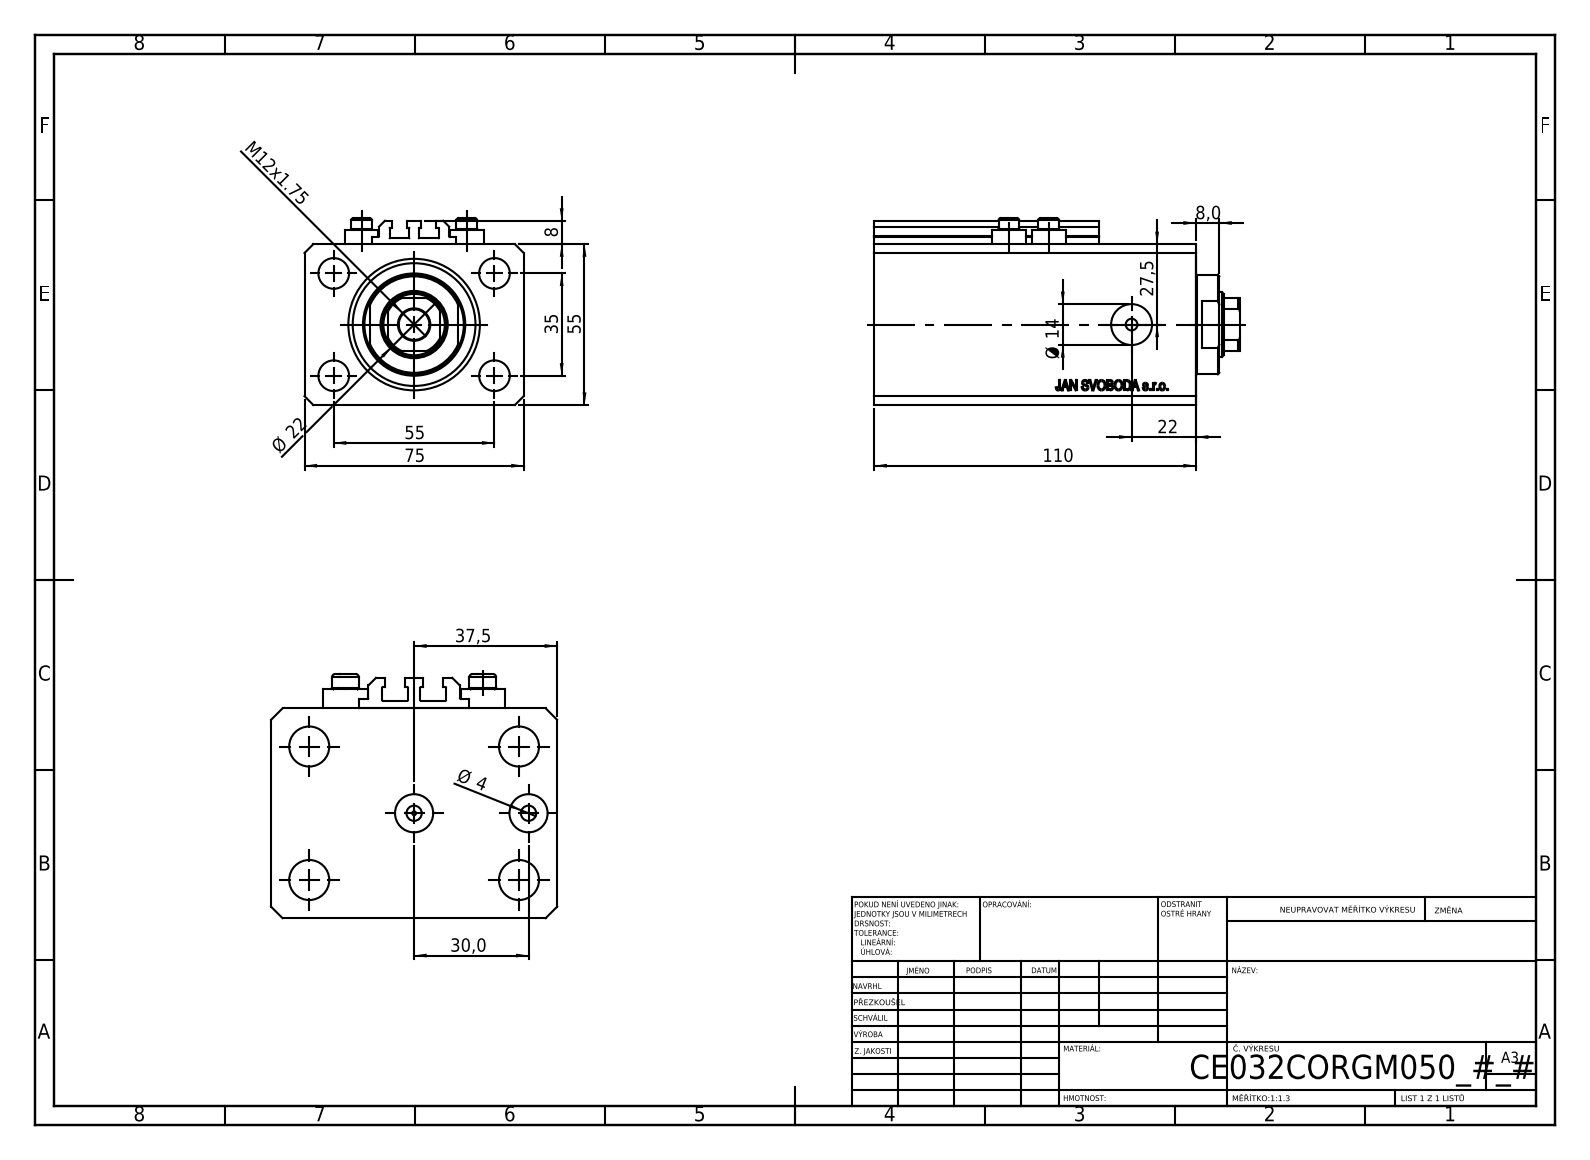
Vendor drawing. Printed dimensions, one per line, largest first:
110
75
55
55
37,5
35
30,0
27,5
Ø 22
22
Ø 14
M12x1.75
8
8,0
Ø 4
